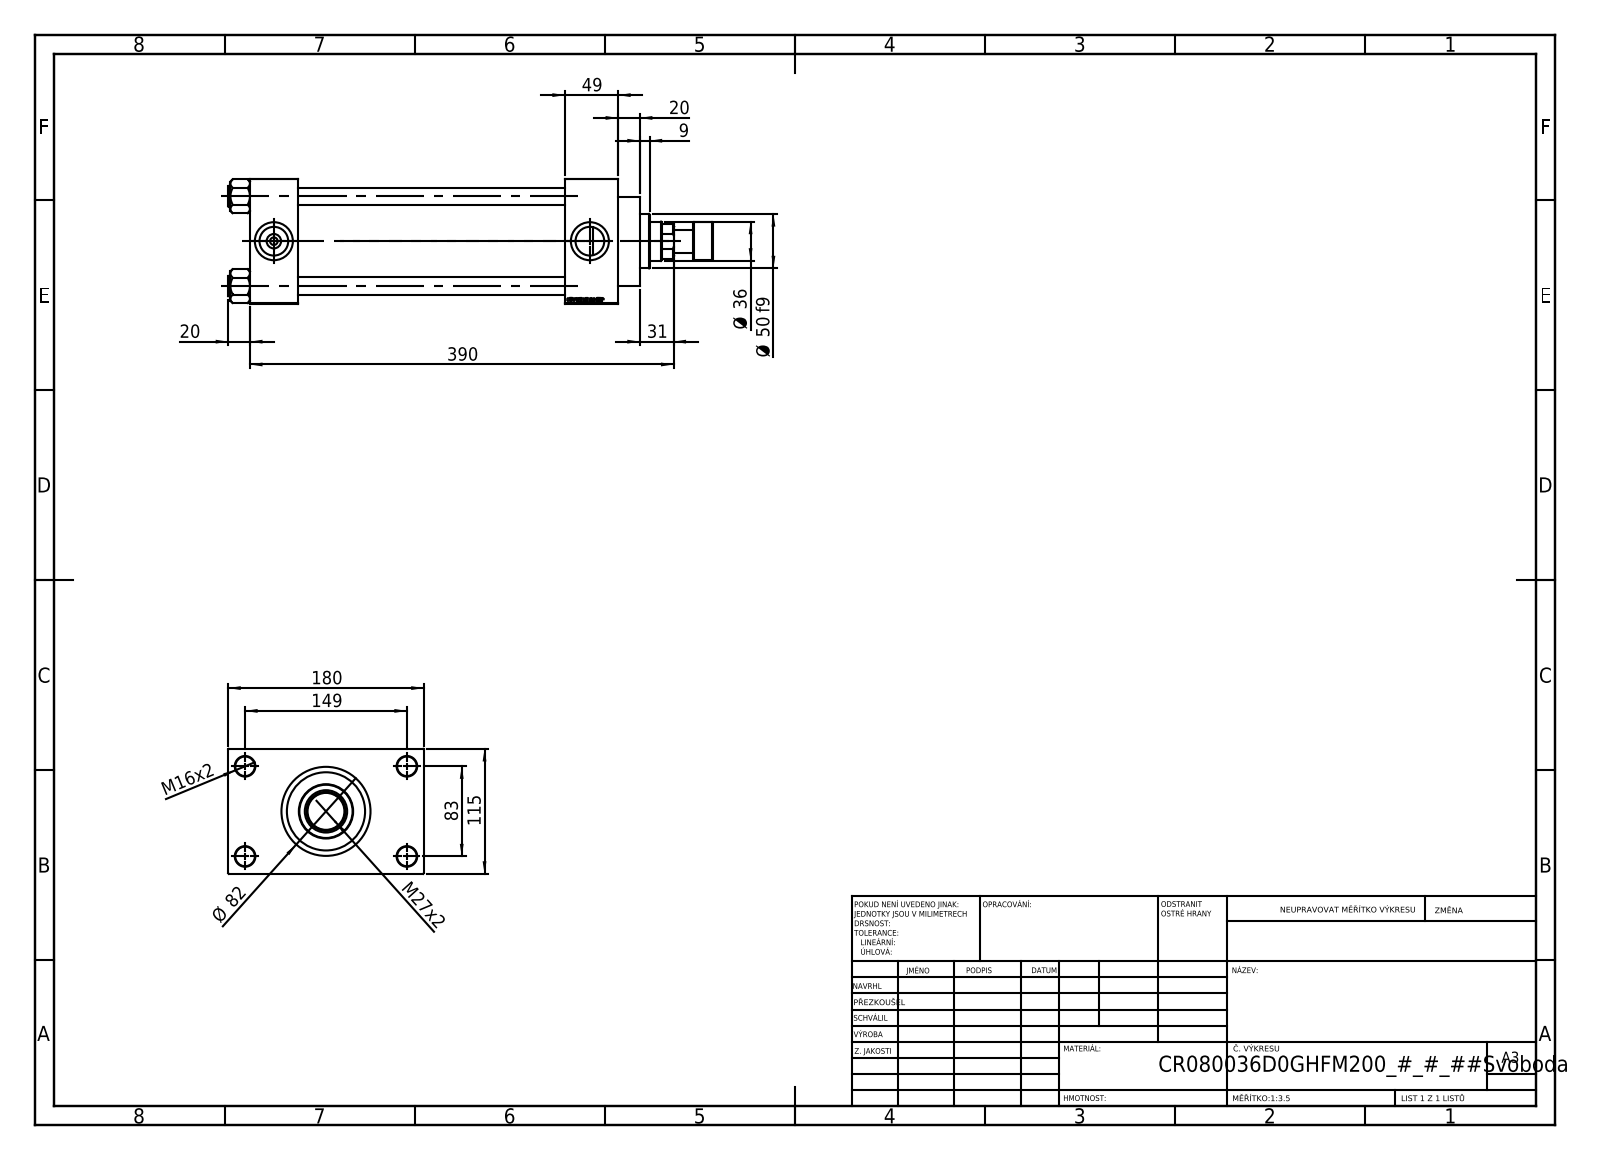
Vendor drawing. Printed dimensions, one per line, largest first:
390
180
149
115
83
Ø 82
Ø 50 f9
49
Ø 36
31
M27x2
20
20
M16x2
9
